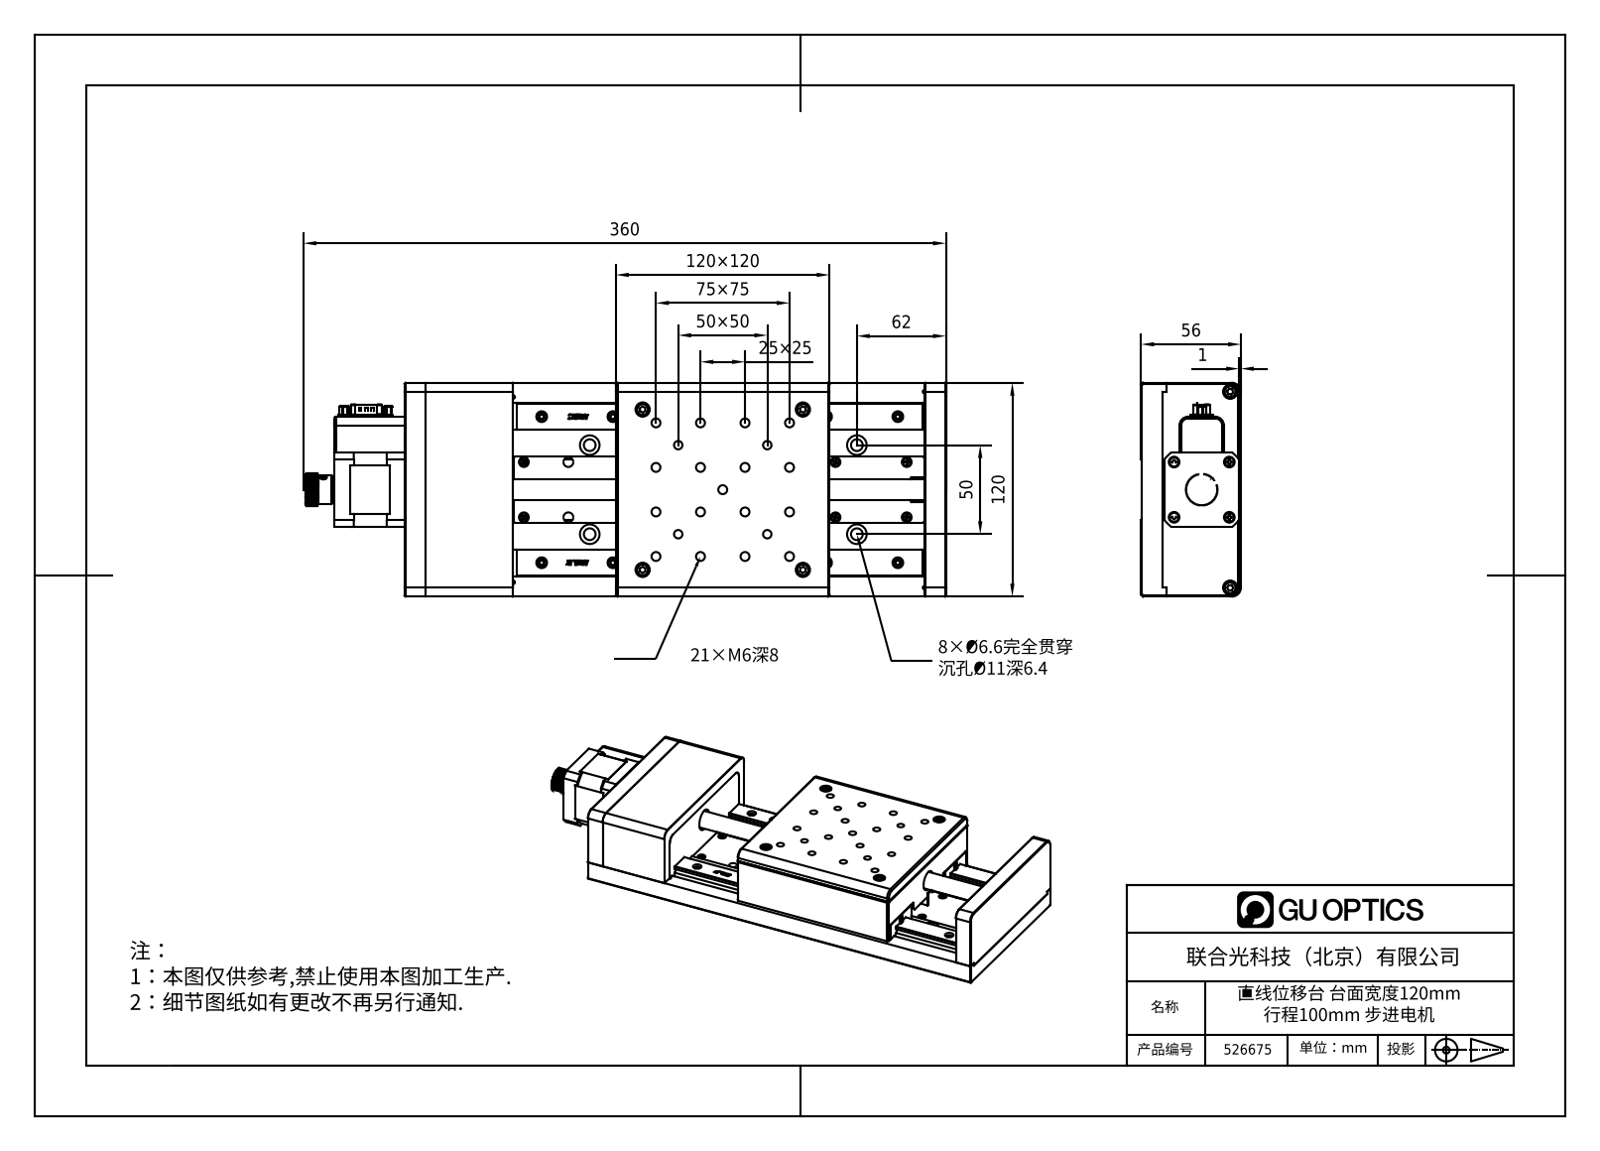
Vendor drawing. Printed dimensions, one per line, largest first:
360
120×120
120
75×75
62
56
50×50
50
25×25
1
